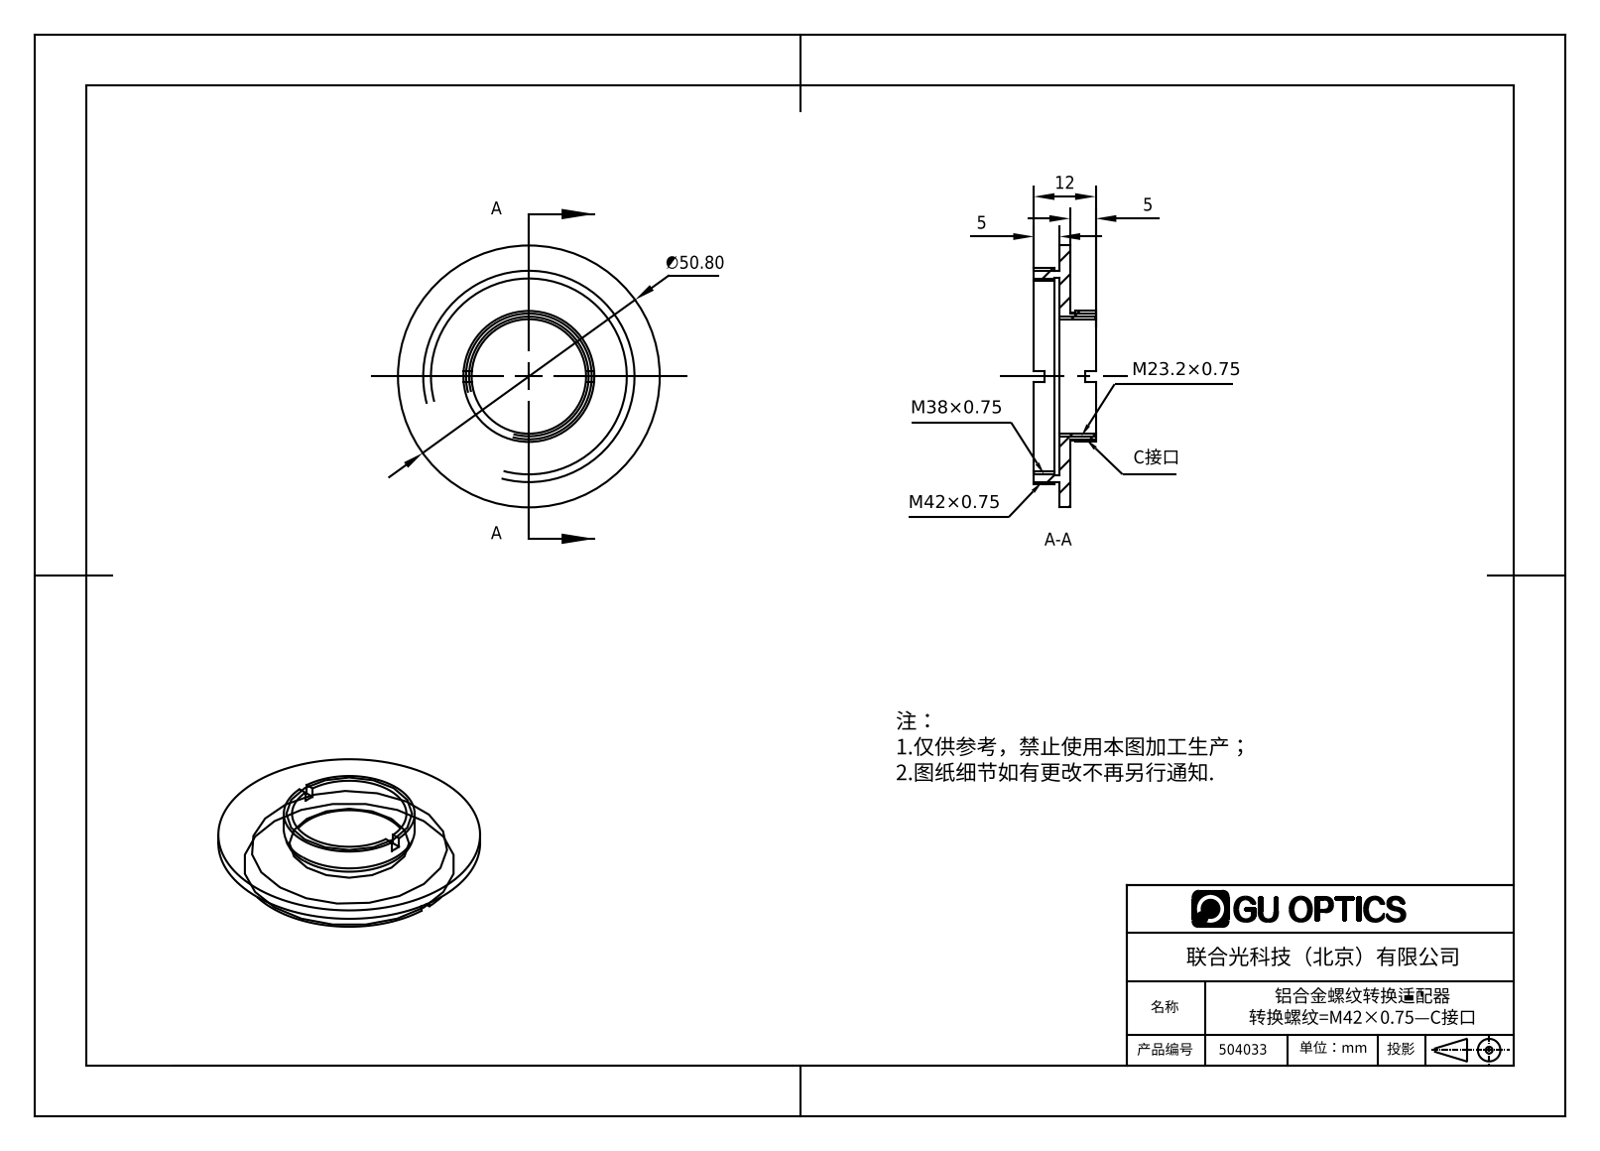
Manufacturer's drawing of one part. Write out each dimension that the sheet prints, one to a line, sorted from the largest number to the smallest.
∅50.80
12
5
5
